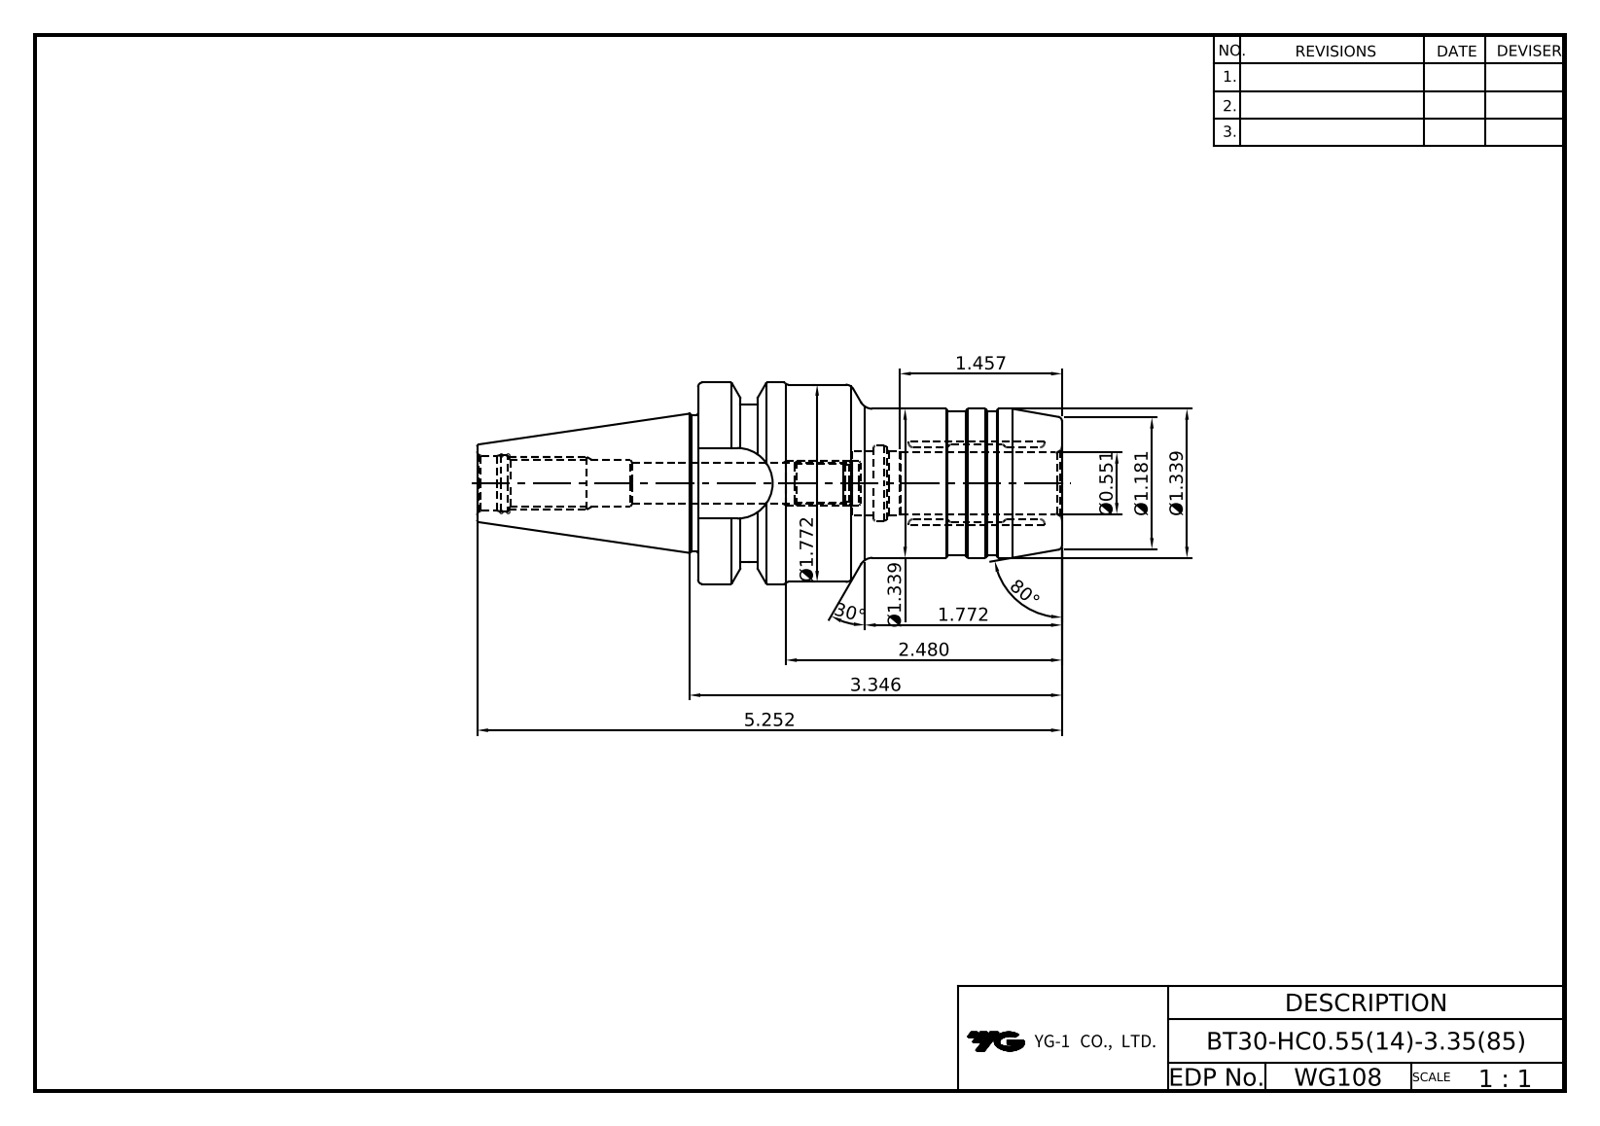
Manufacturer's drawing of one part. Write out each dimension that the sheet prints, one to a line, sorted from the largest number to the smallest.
80°
30°
5.252
3.346
2.480
1.772
Ø1.772
1.457
Ø1.339
Ø1.339
Ø1.181
Ø0.551
